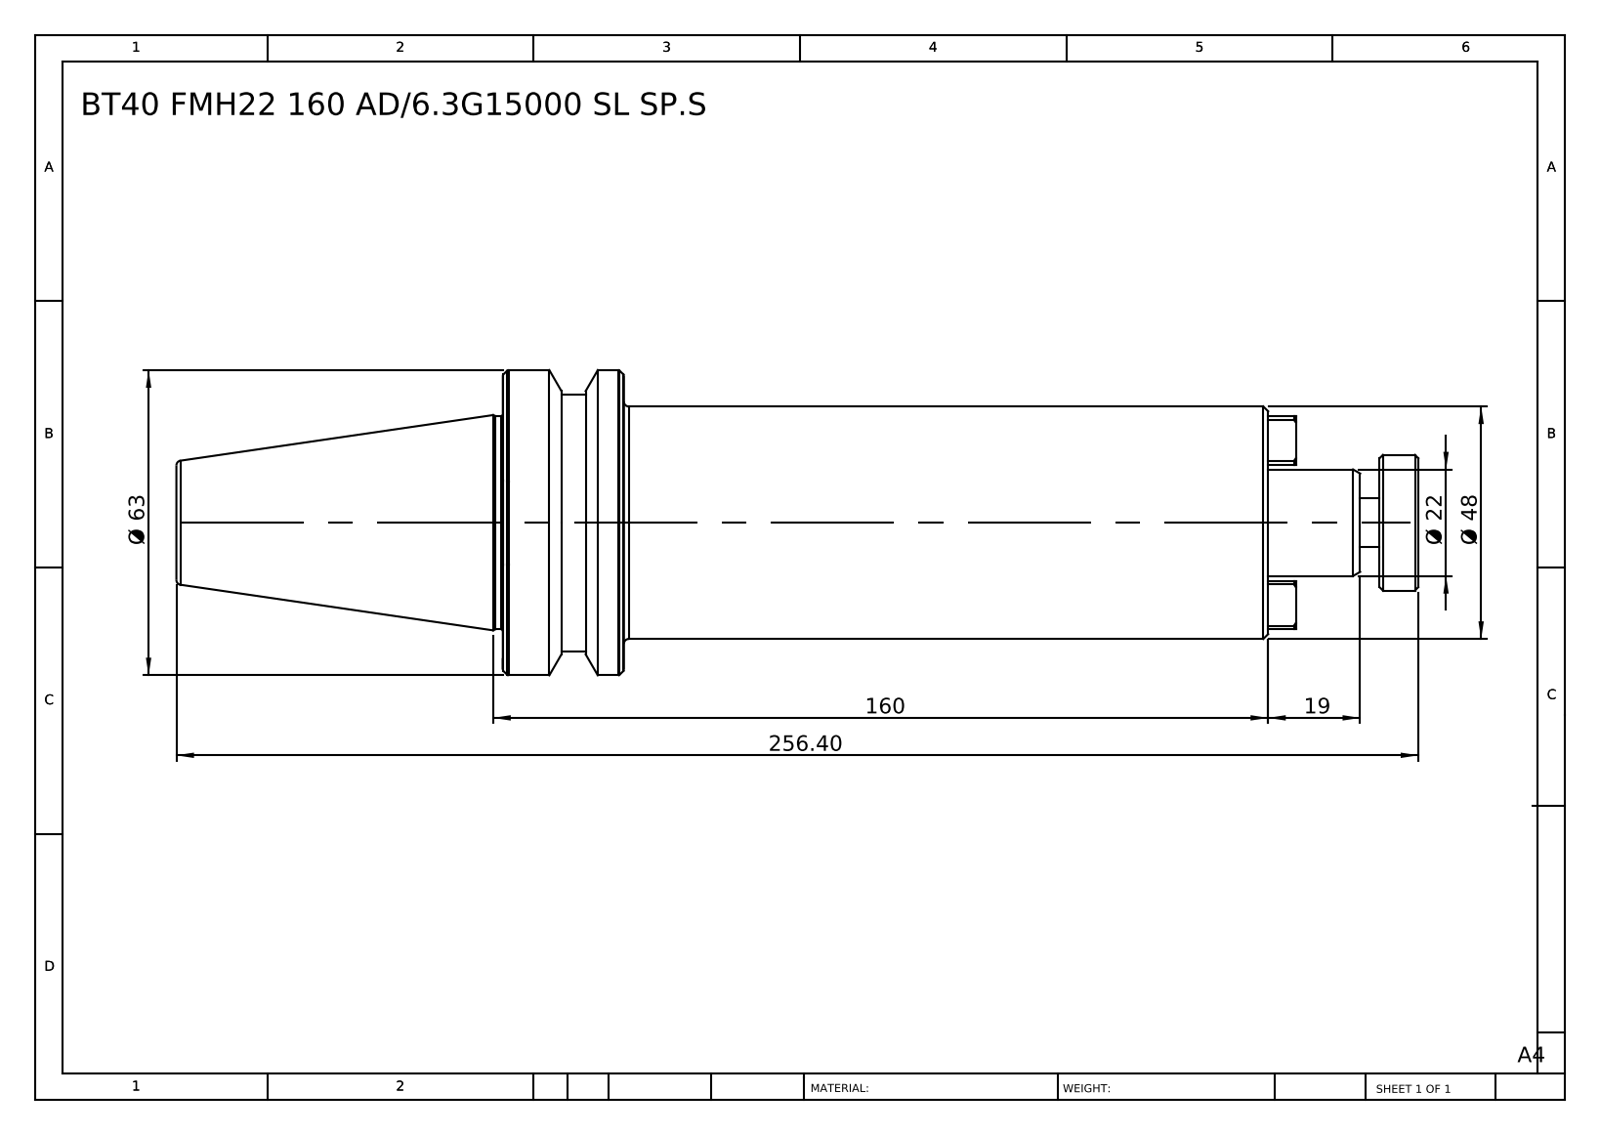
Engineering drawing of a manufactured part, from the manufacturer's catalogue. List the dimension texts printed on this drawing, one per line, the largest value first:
256.40
160
Ø 63
Ø 48
Ø 22
19
